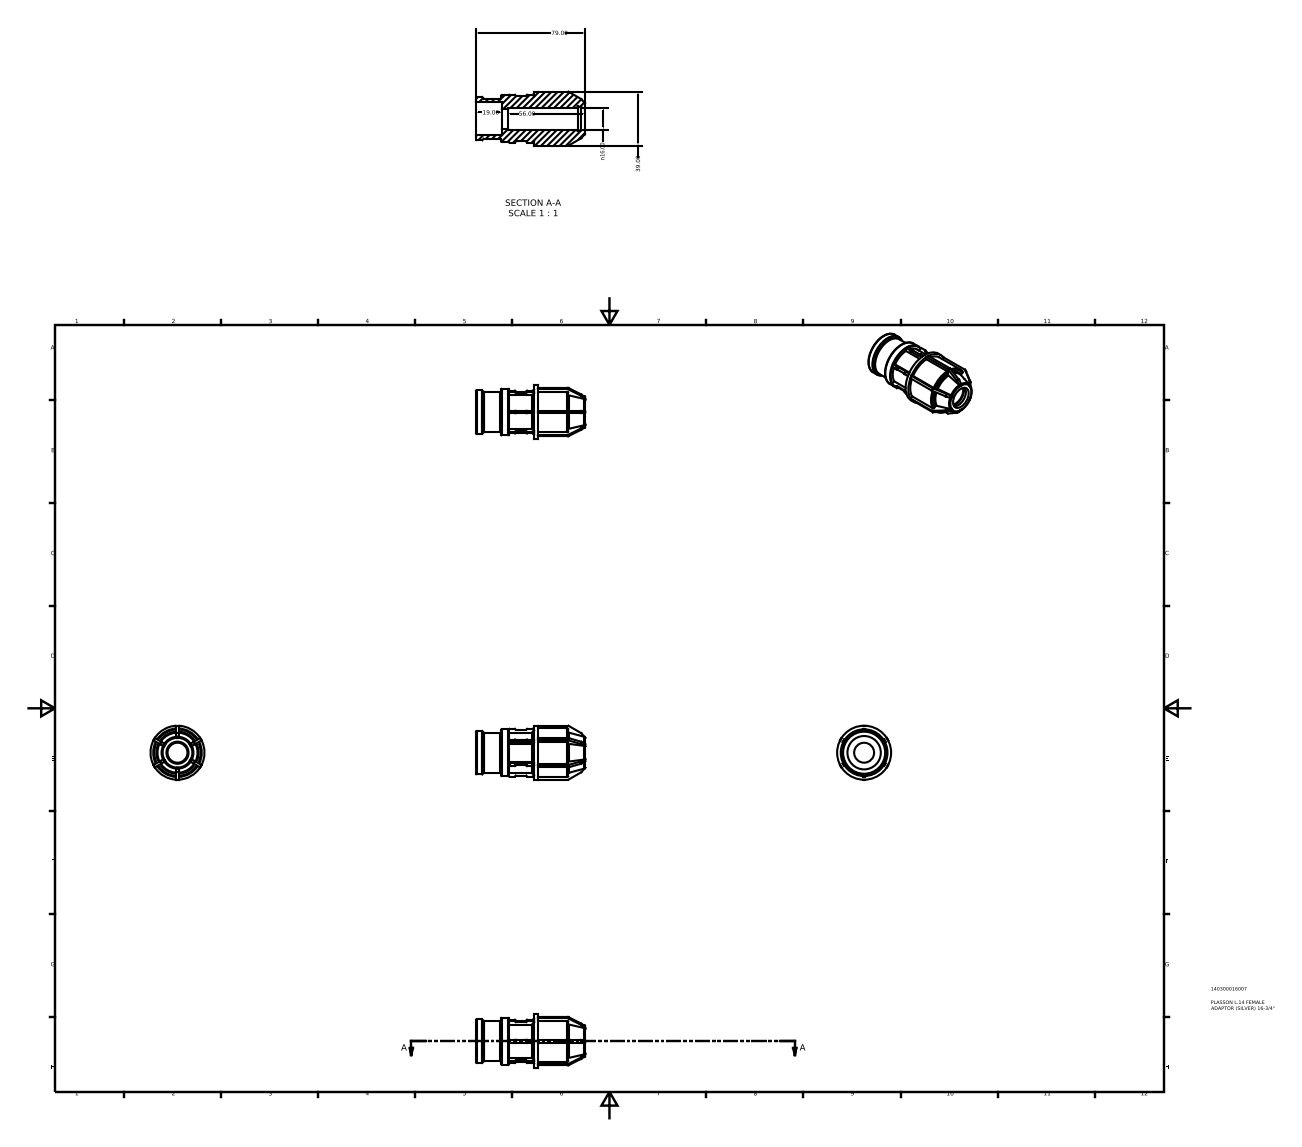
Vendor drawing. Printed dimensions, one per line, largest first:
79.00
56.00
39.00
19.00
n16.00
